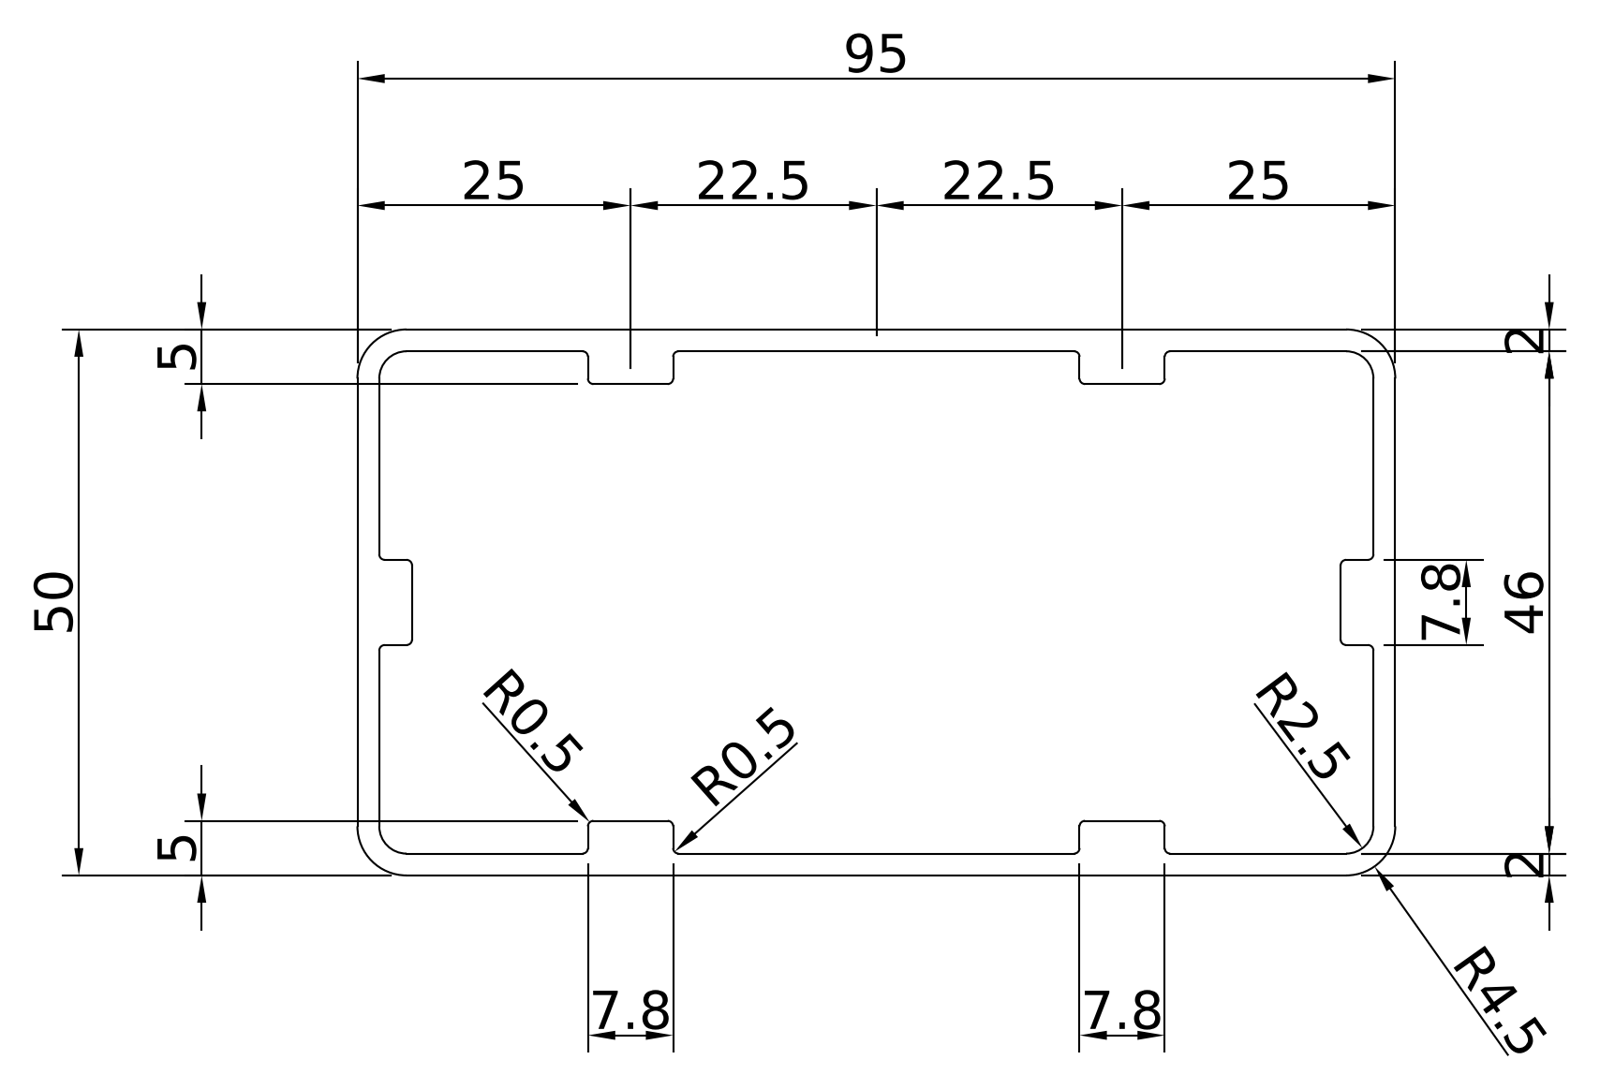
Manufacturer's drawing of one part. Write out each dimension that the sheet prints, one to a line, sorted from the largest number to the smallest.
95
50
46
25
25
22.5
22.5
7.8
7.8
7.8
5
5
R4.5
R2.5
2
2
R0.5
R0.5
